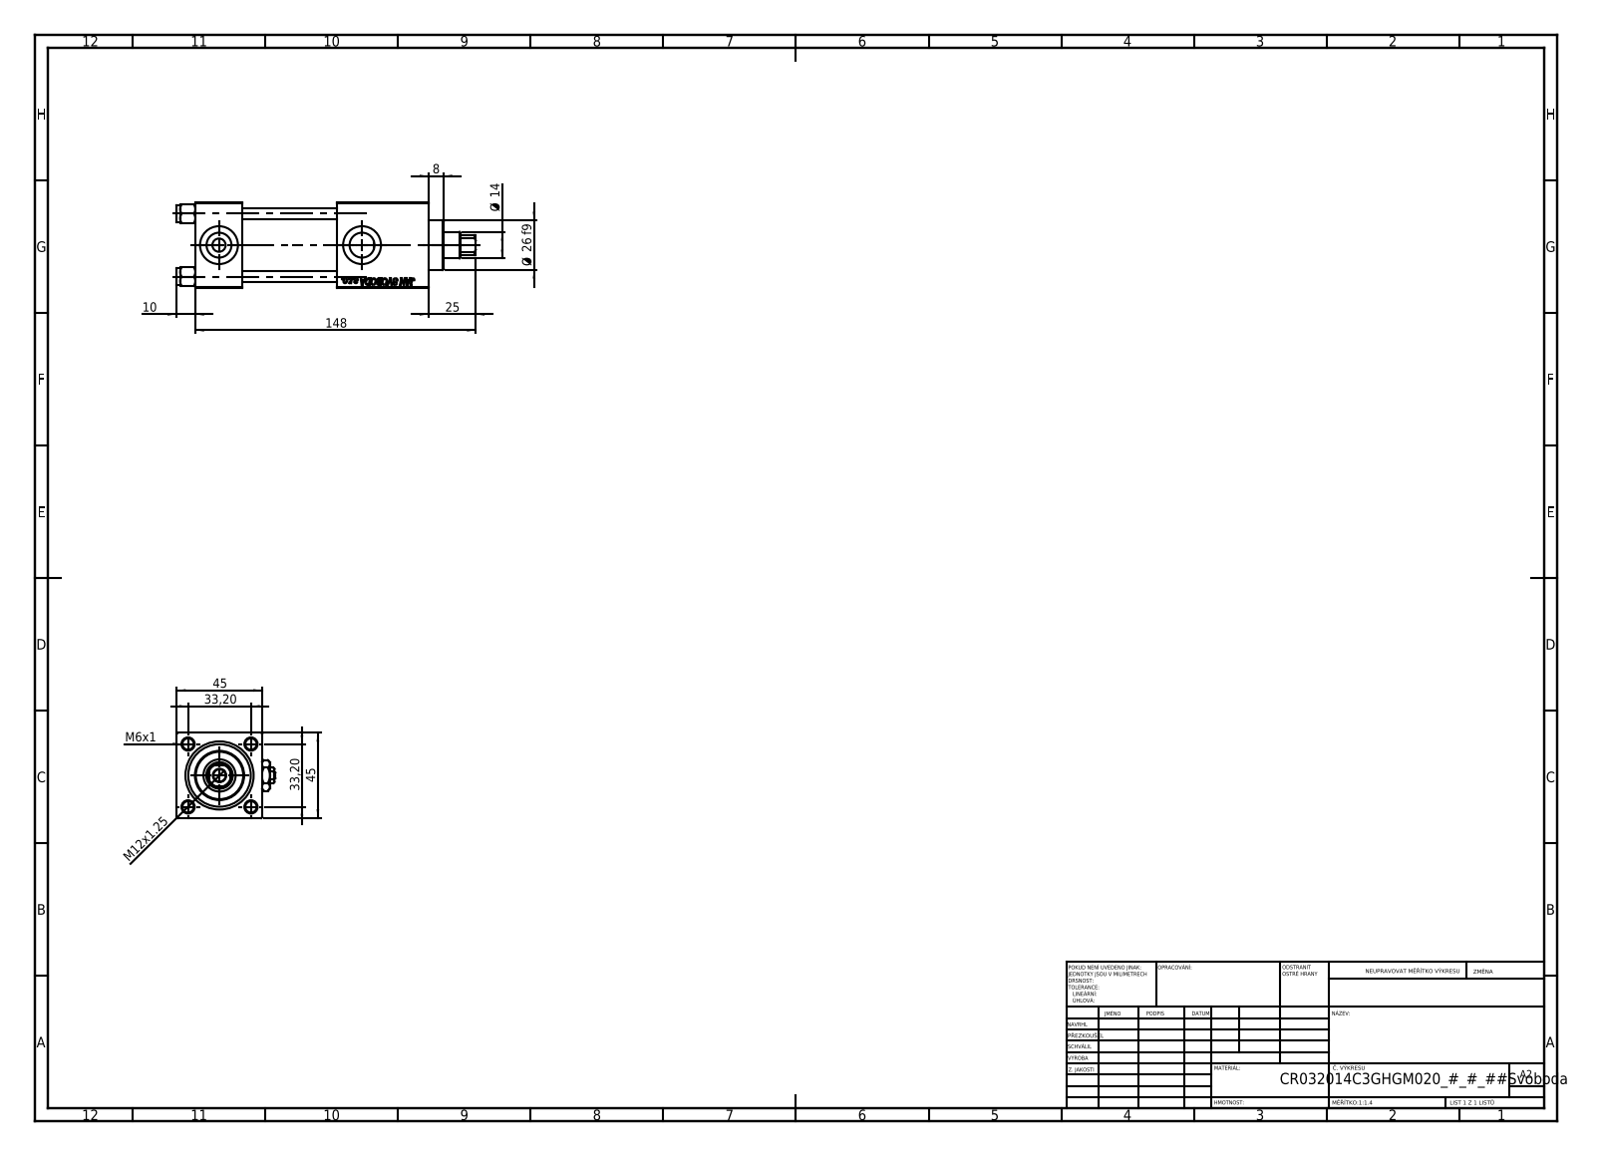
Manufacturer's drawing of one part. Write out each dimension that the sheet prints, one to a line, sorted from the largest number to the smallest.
148
45
45
33,20
33,20
Ø 26 f9
25
Ø 14
M12x1.25
10
8
M6x1
